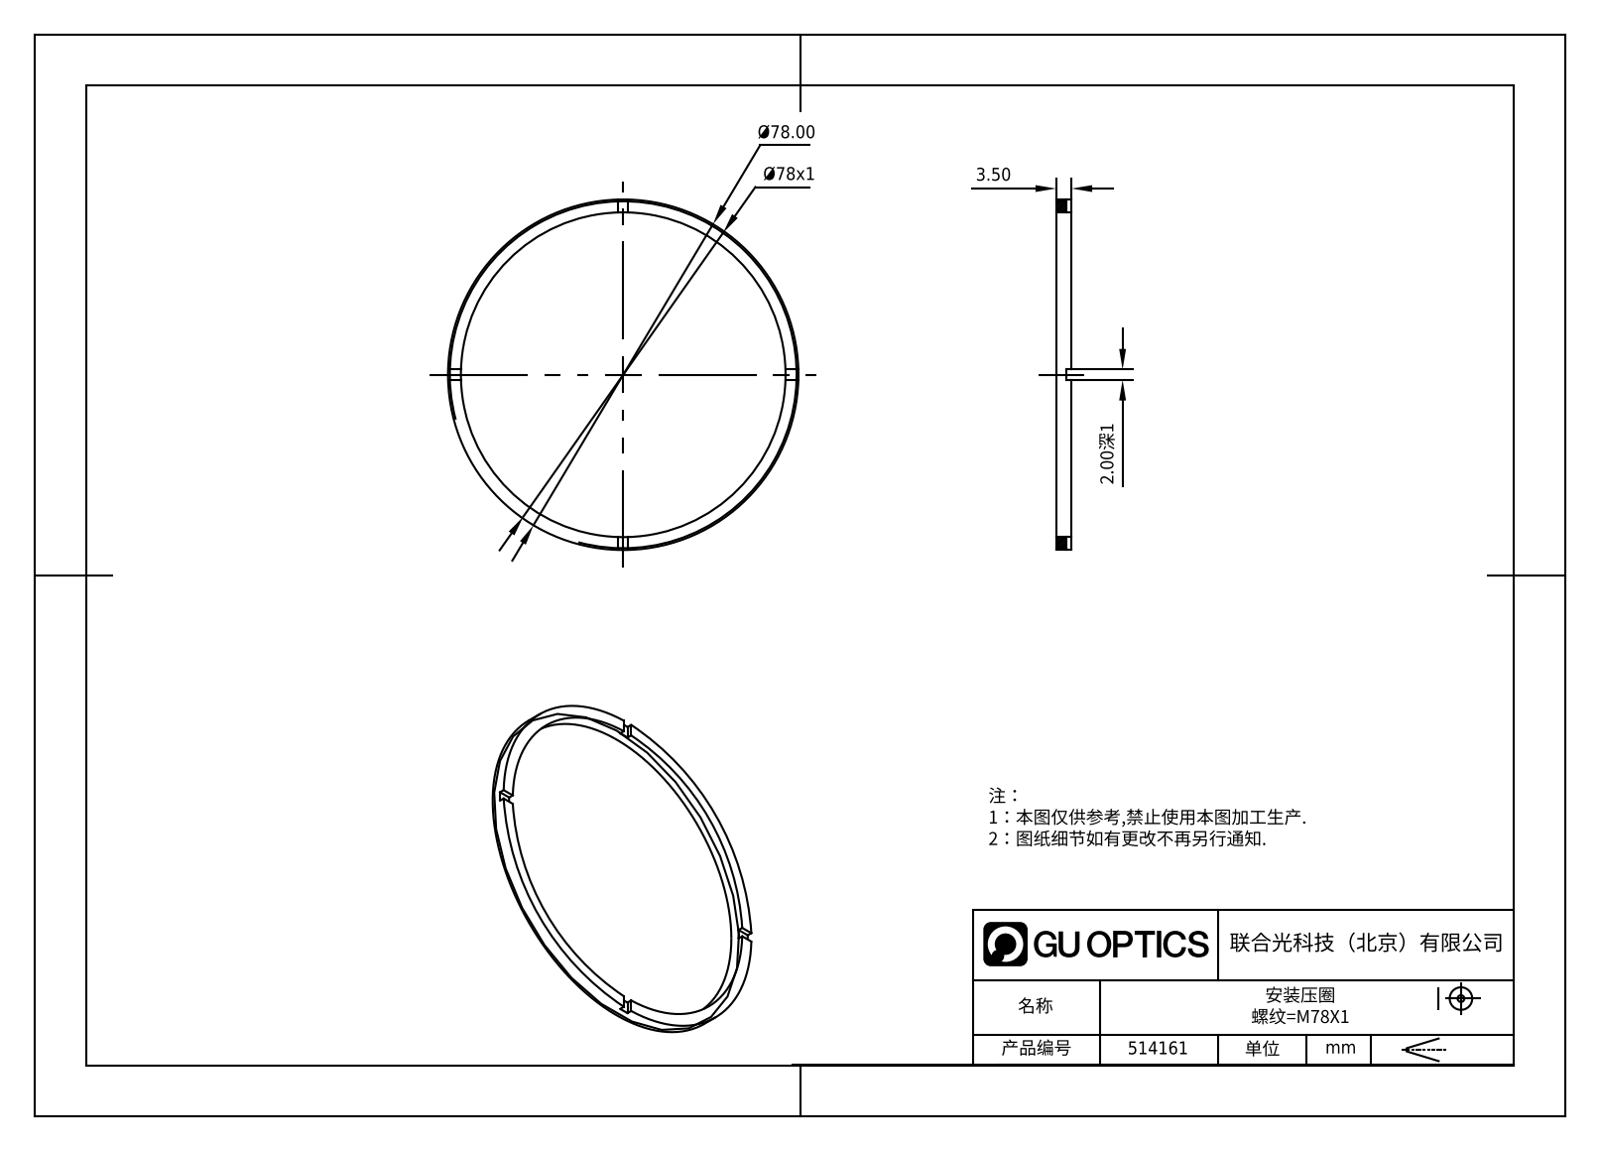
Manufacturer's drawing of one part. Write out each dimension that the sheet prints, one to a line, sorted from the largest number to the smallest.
Ø78.00
Ø78x1
3.50
2.00深1
